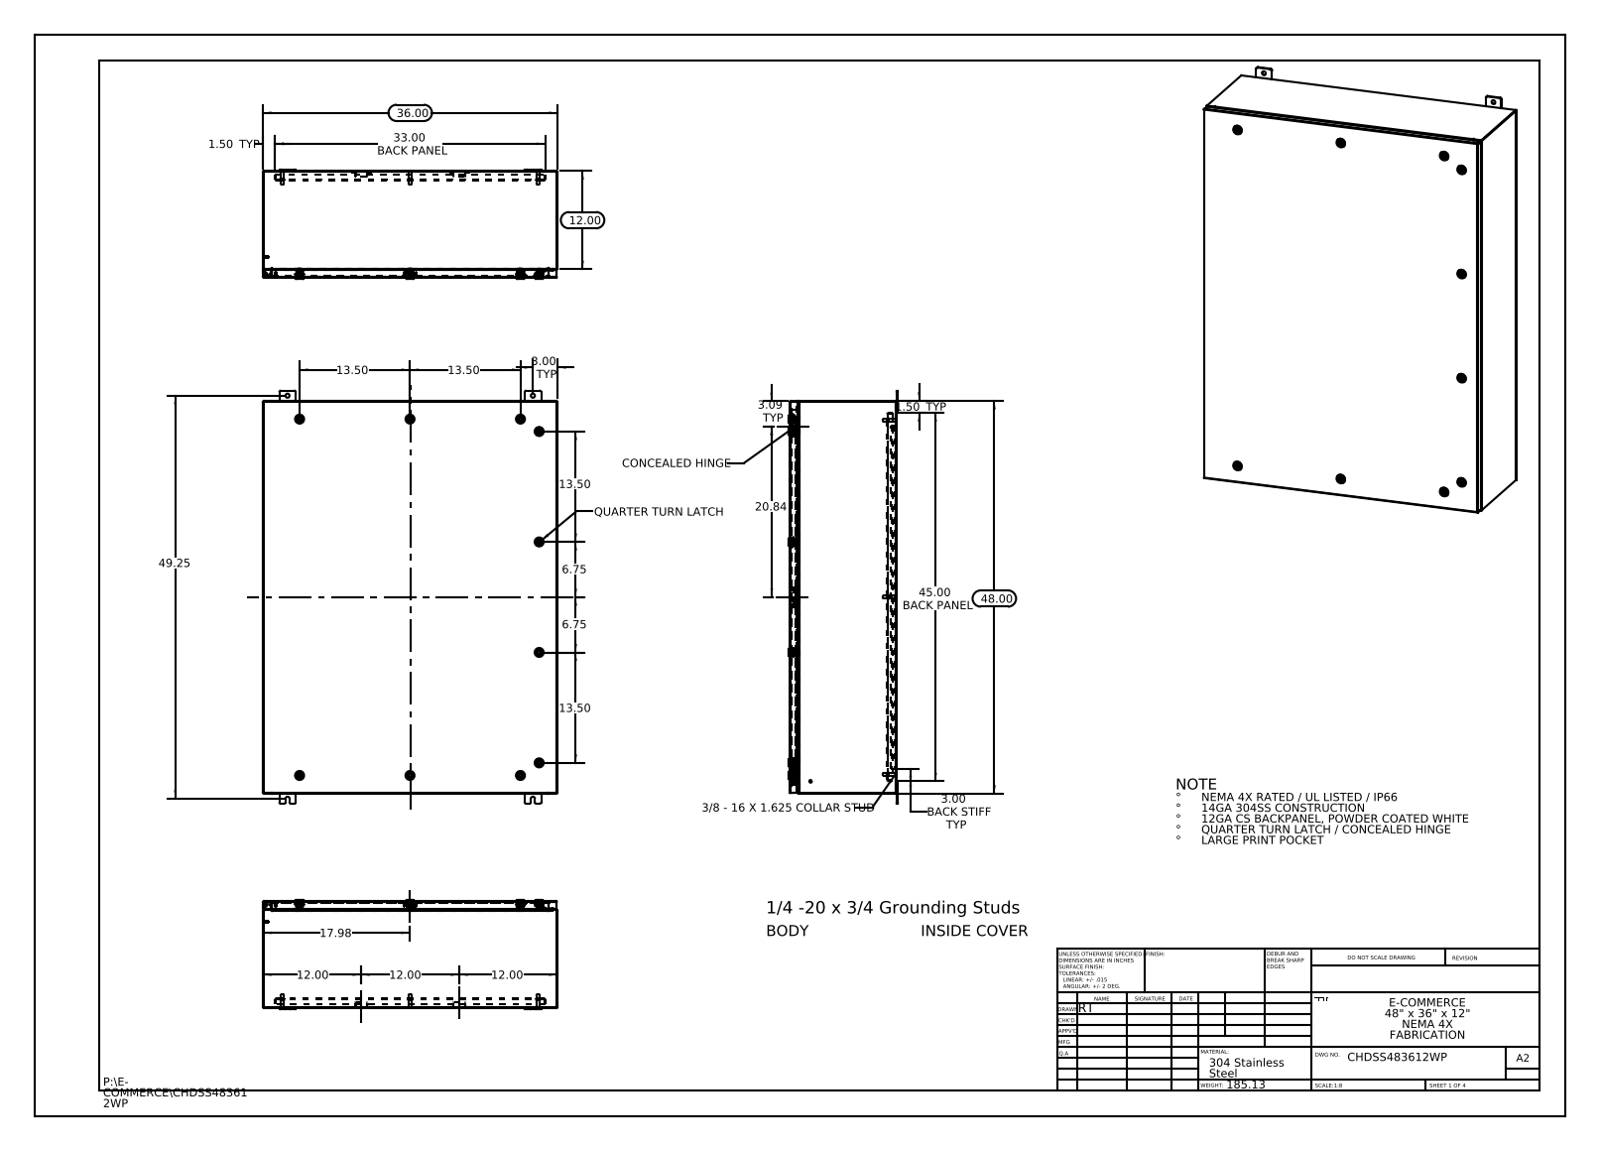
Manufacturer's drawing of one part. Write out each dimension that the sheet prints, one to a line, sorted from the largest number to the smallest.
49.25
48.00
45.00 BACK PANEL
36.00
33.00 BACK PANEL
20.84
17.98
13.50
13.50
13.50
13.50
12.00
12.00
12.00
12.00
6.75
6.75
3.09 TYP
3.00 TYP
3.00 BACK STIFF TYP
1.50 TYP
1.50 TYP
